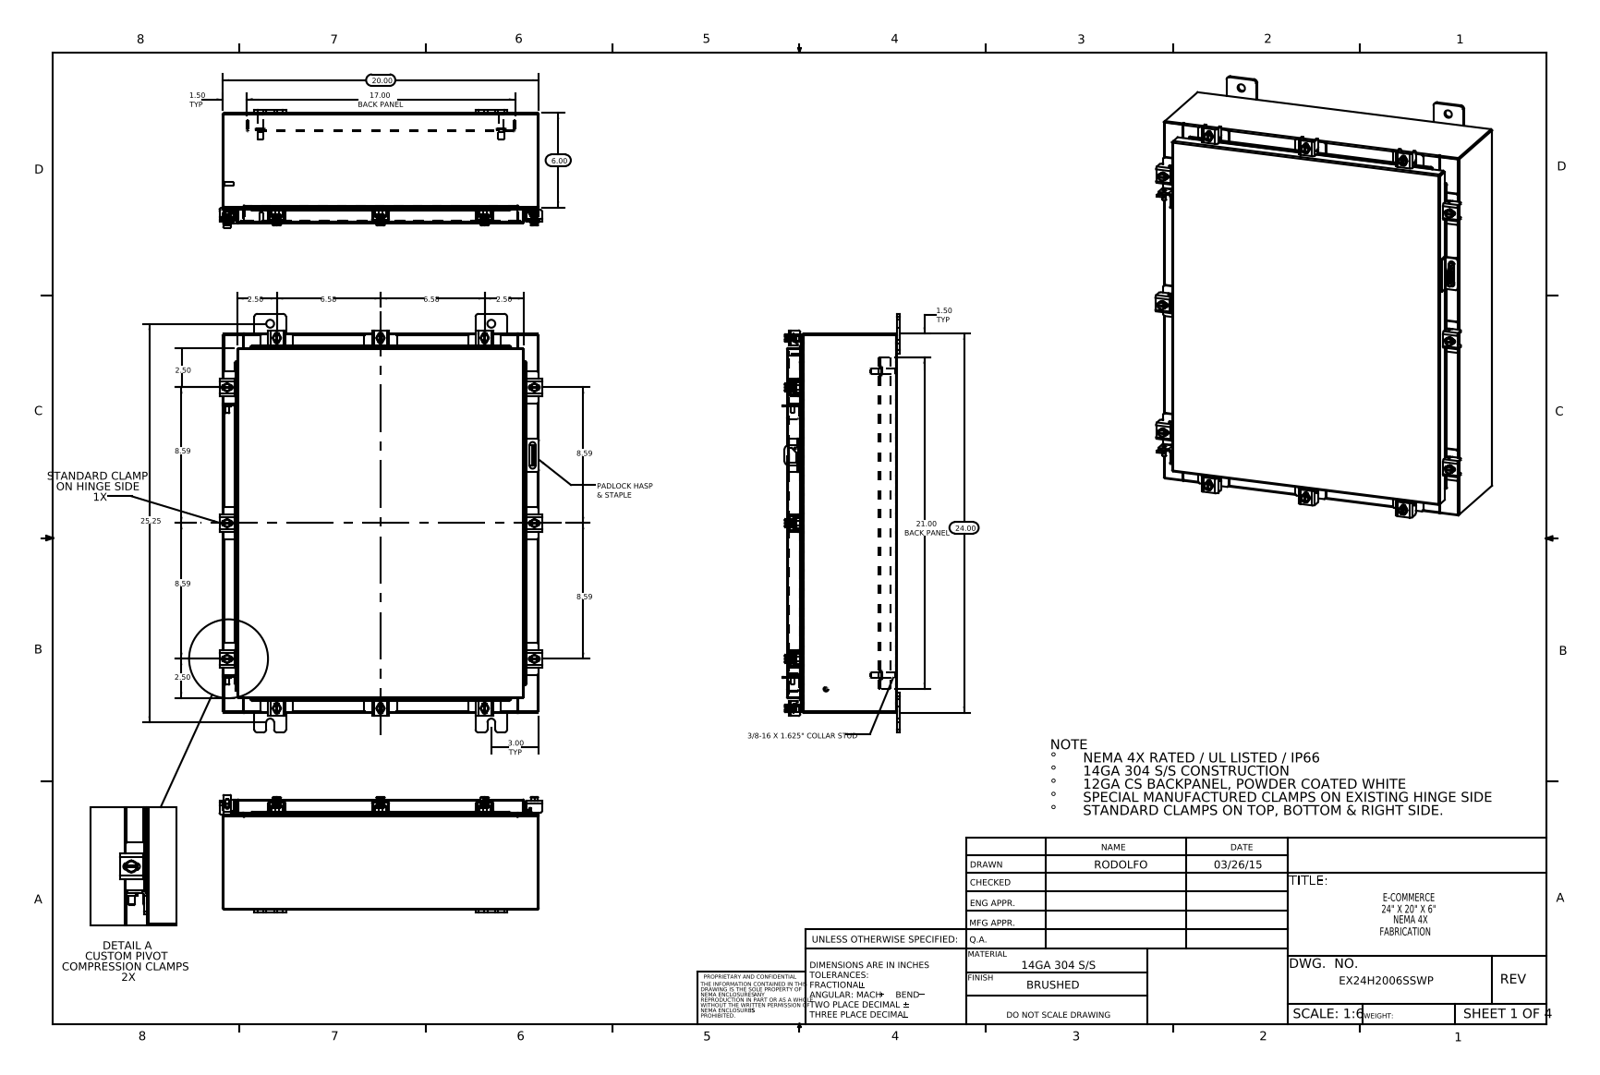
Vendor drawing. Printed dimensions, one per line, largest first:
25.25
24.00
21.00 BACK PANEL
20.00
17.00 BACK PANEL
8.59
8.59
8.59
8.59
6.58
6.58
6.00
3.00 TYP
2.50
2.50
2.50
2.50
1.50 TYP
1.50 TYP
